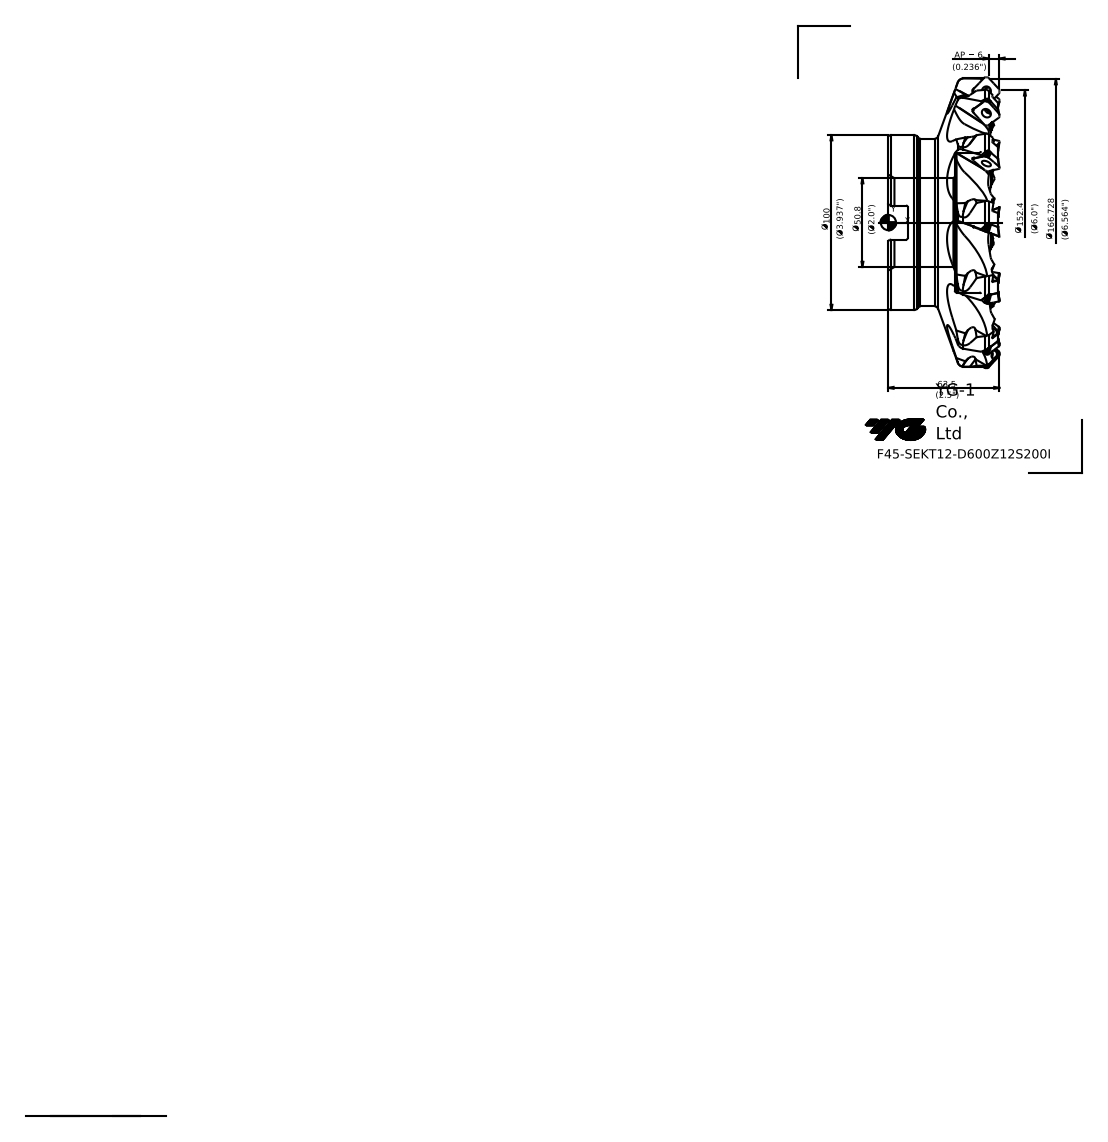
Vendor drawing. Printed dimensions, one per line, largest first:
166.728 Ø
152.4 Ø
Ø 100
63.5
50.8 Ø
AP = 6
